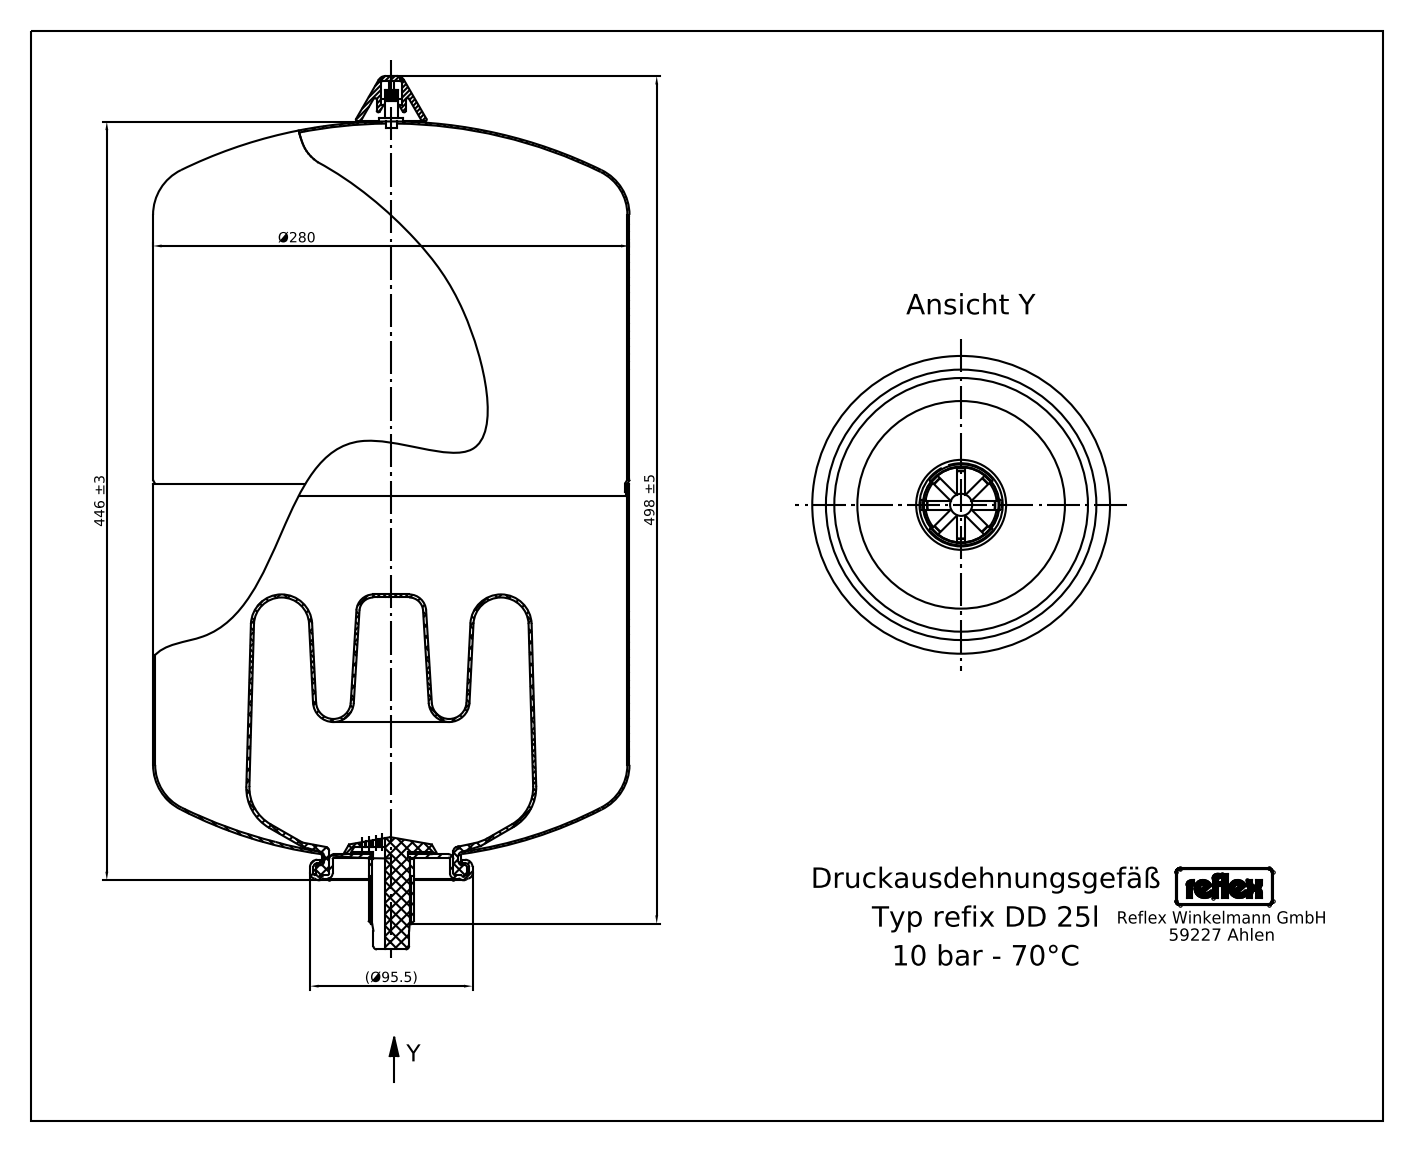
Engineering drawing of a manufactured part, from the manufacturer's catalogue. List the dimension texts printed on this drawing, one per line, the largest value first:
498 ±5
446 ±3
Ø280
(Ø95.5)
